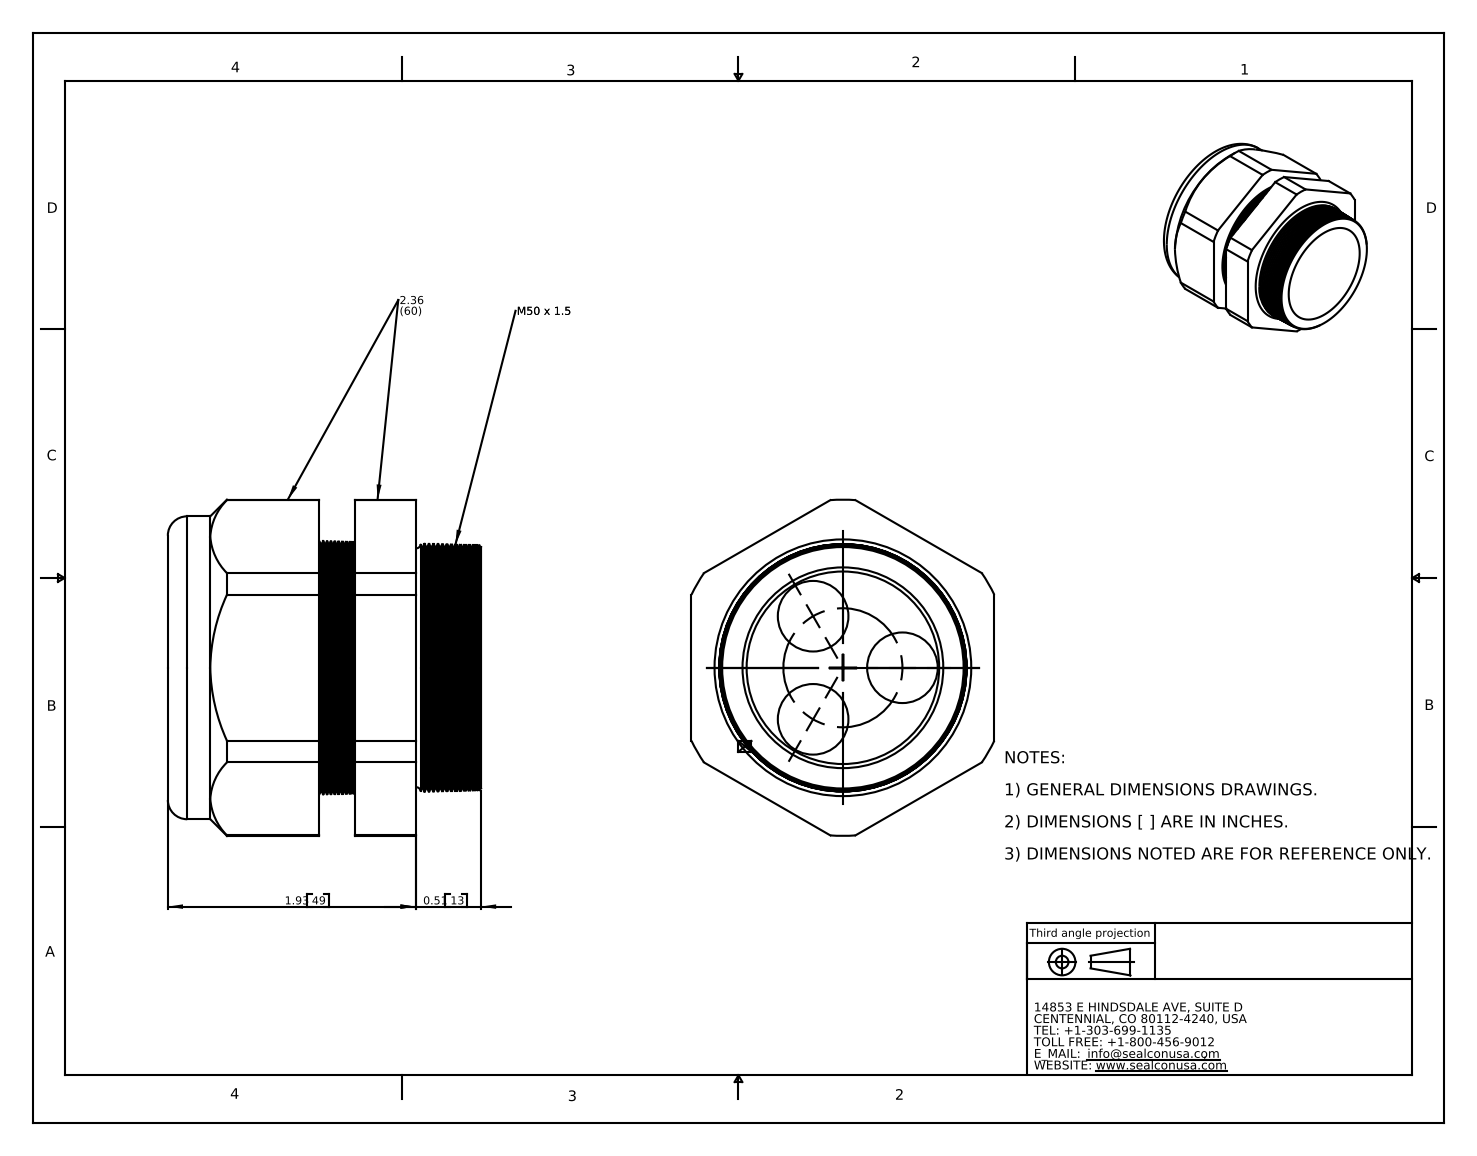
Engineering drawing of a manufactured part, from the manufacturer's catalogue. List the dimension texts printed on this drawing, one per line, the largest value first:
1.93 49
0.51 13
